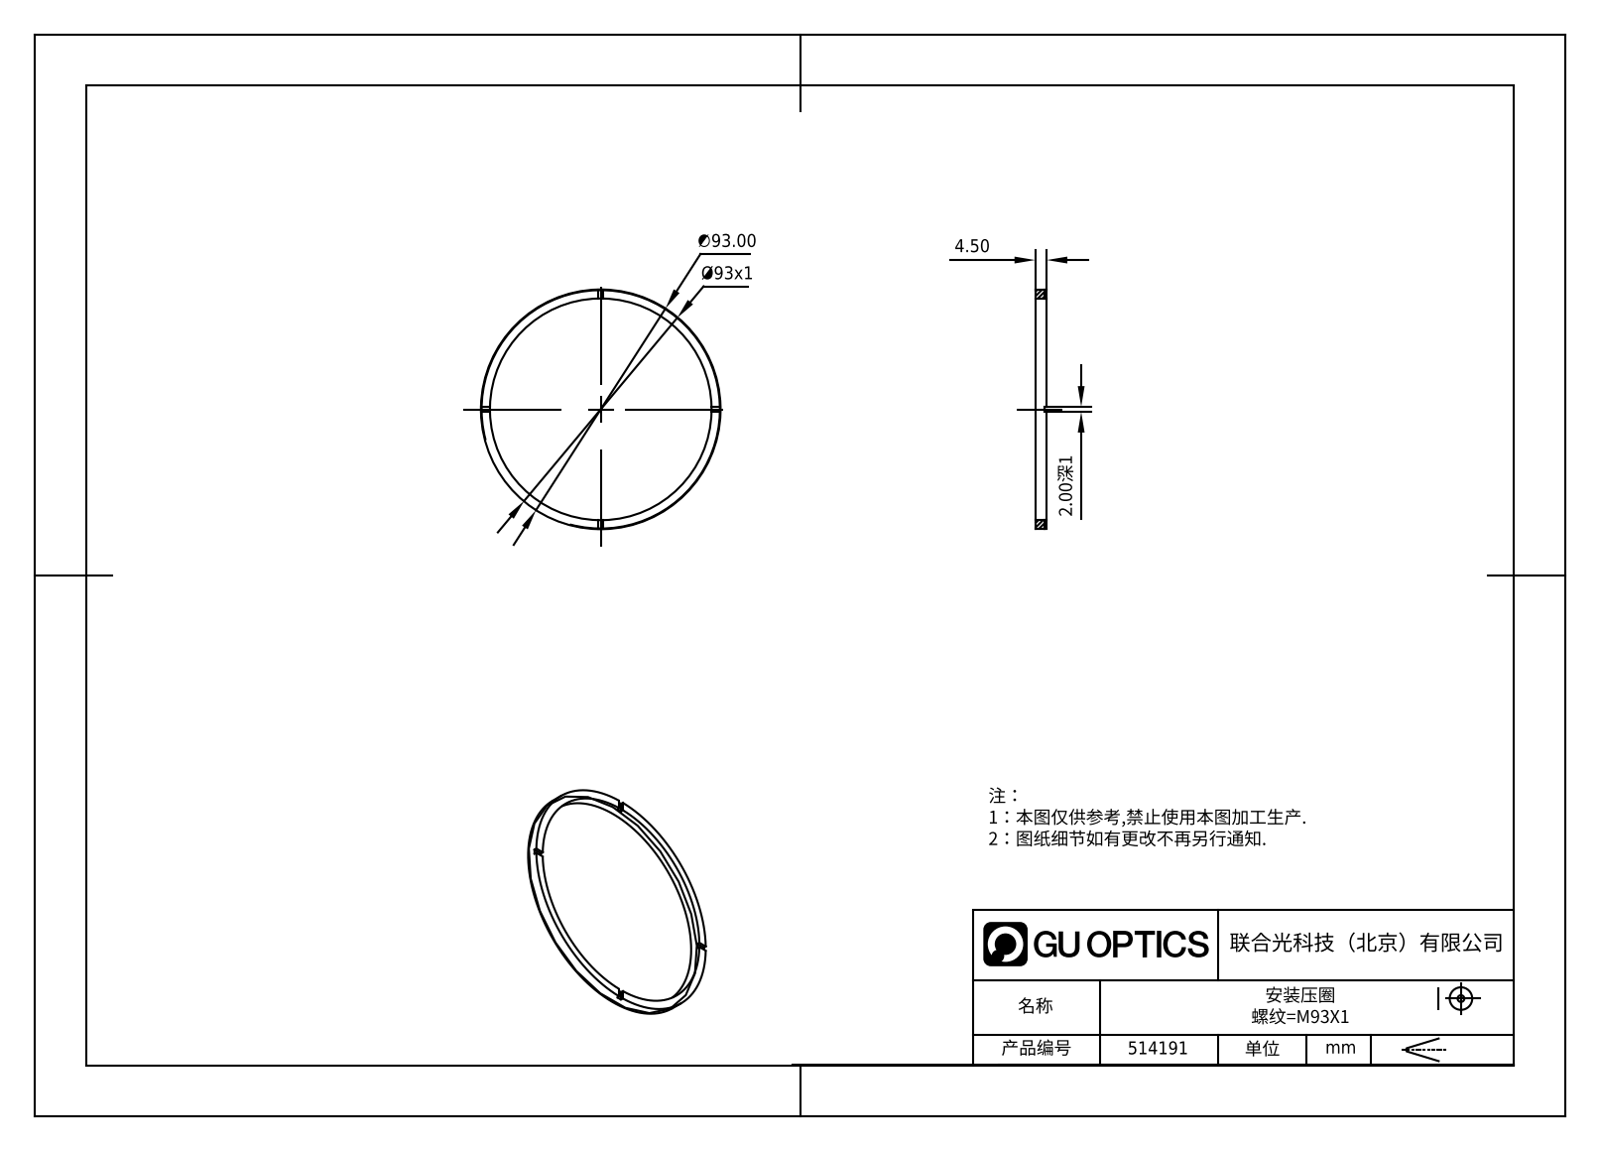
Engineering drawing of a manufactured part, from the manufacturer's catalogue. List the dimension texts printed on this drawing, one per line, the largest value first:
∅93.00
Ø93x1
4.50
2.00深1
